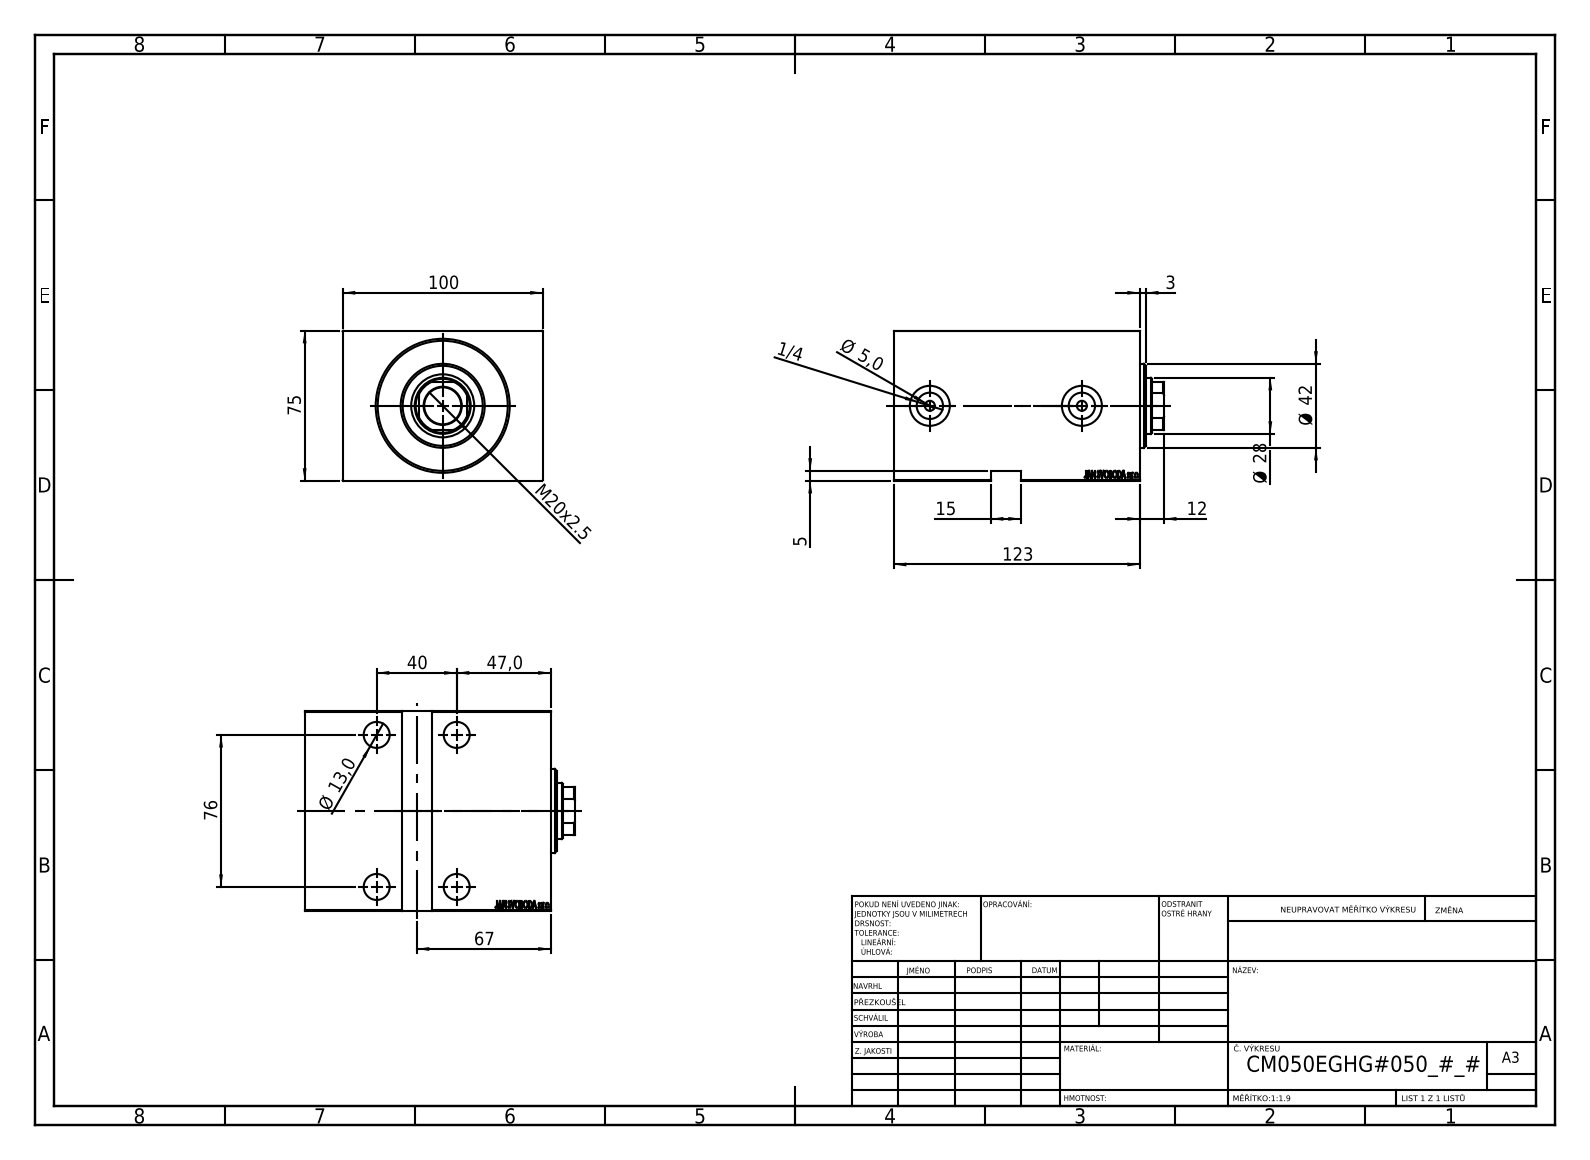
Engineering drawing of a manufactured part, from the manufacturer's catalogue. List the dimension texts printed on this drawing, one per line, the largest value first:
123
100
76
75
67
47,0
Ø 42
40
Ø 28
M20x2.5
15
Ø 13,0
12
Ø 5,0
5
3
1/4
